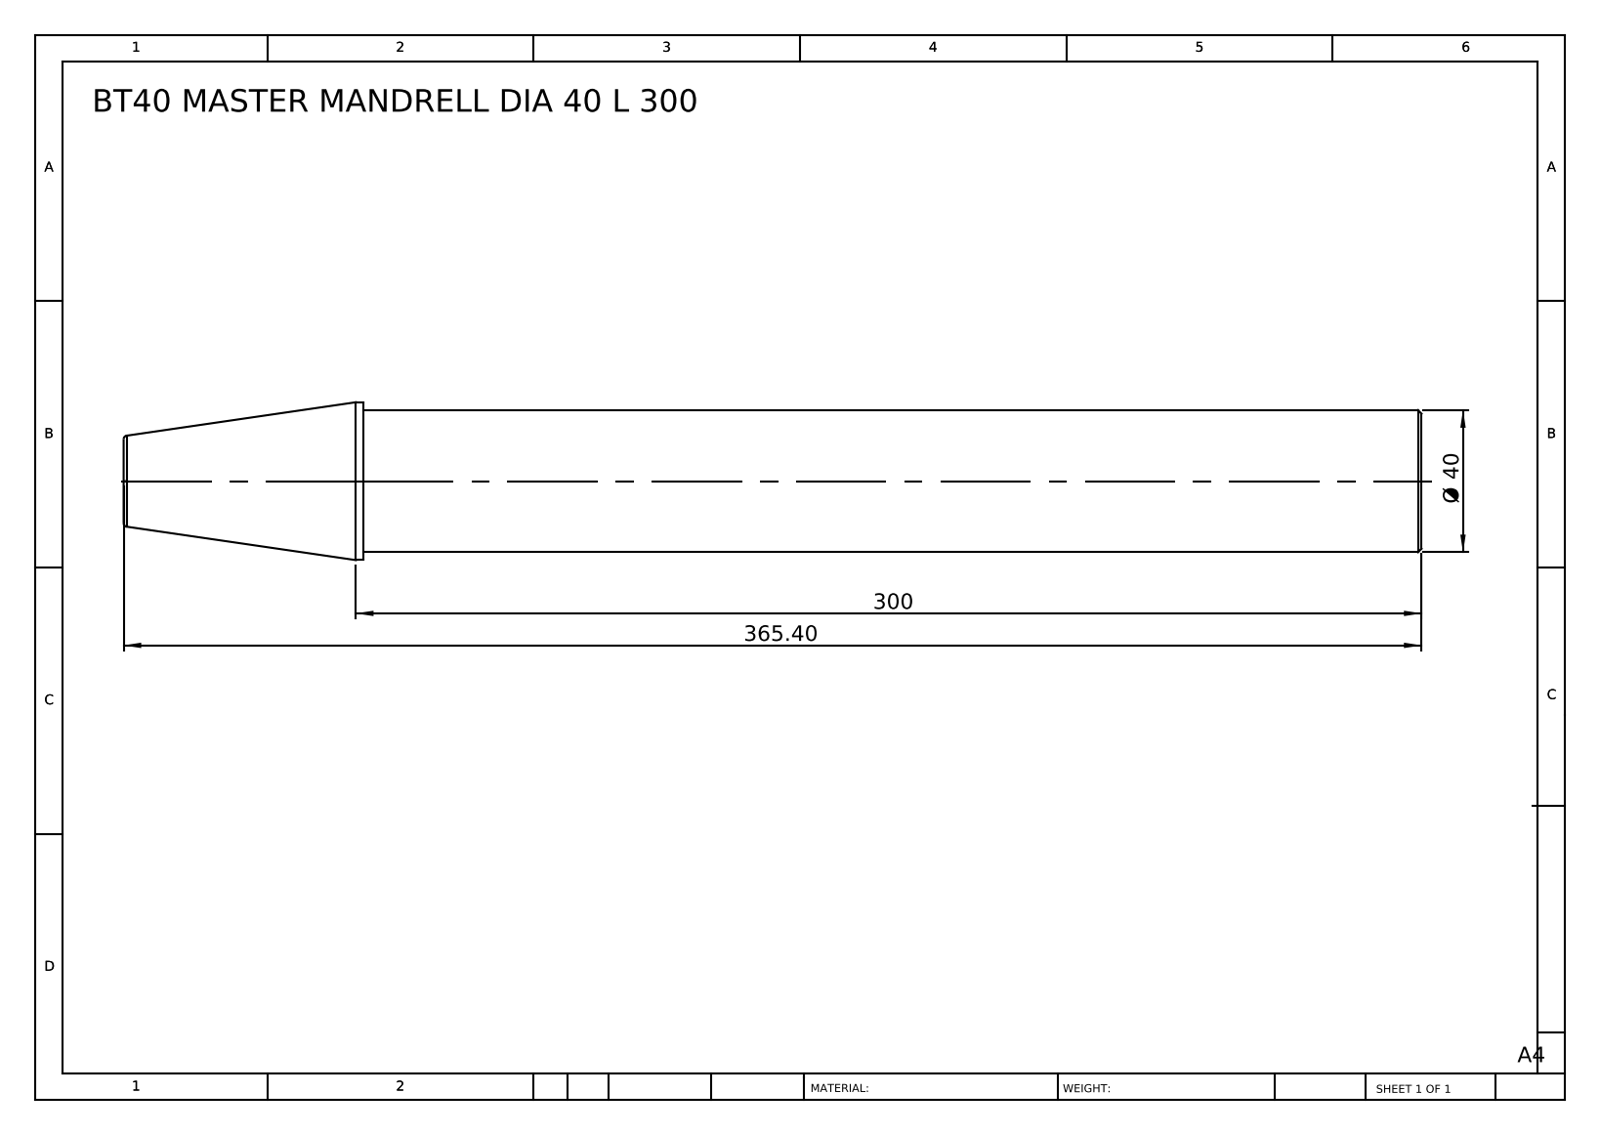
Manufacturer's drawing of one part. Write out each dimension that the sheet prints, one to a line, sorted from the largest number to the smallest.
365.40
300
Ø 40
